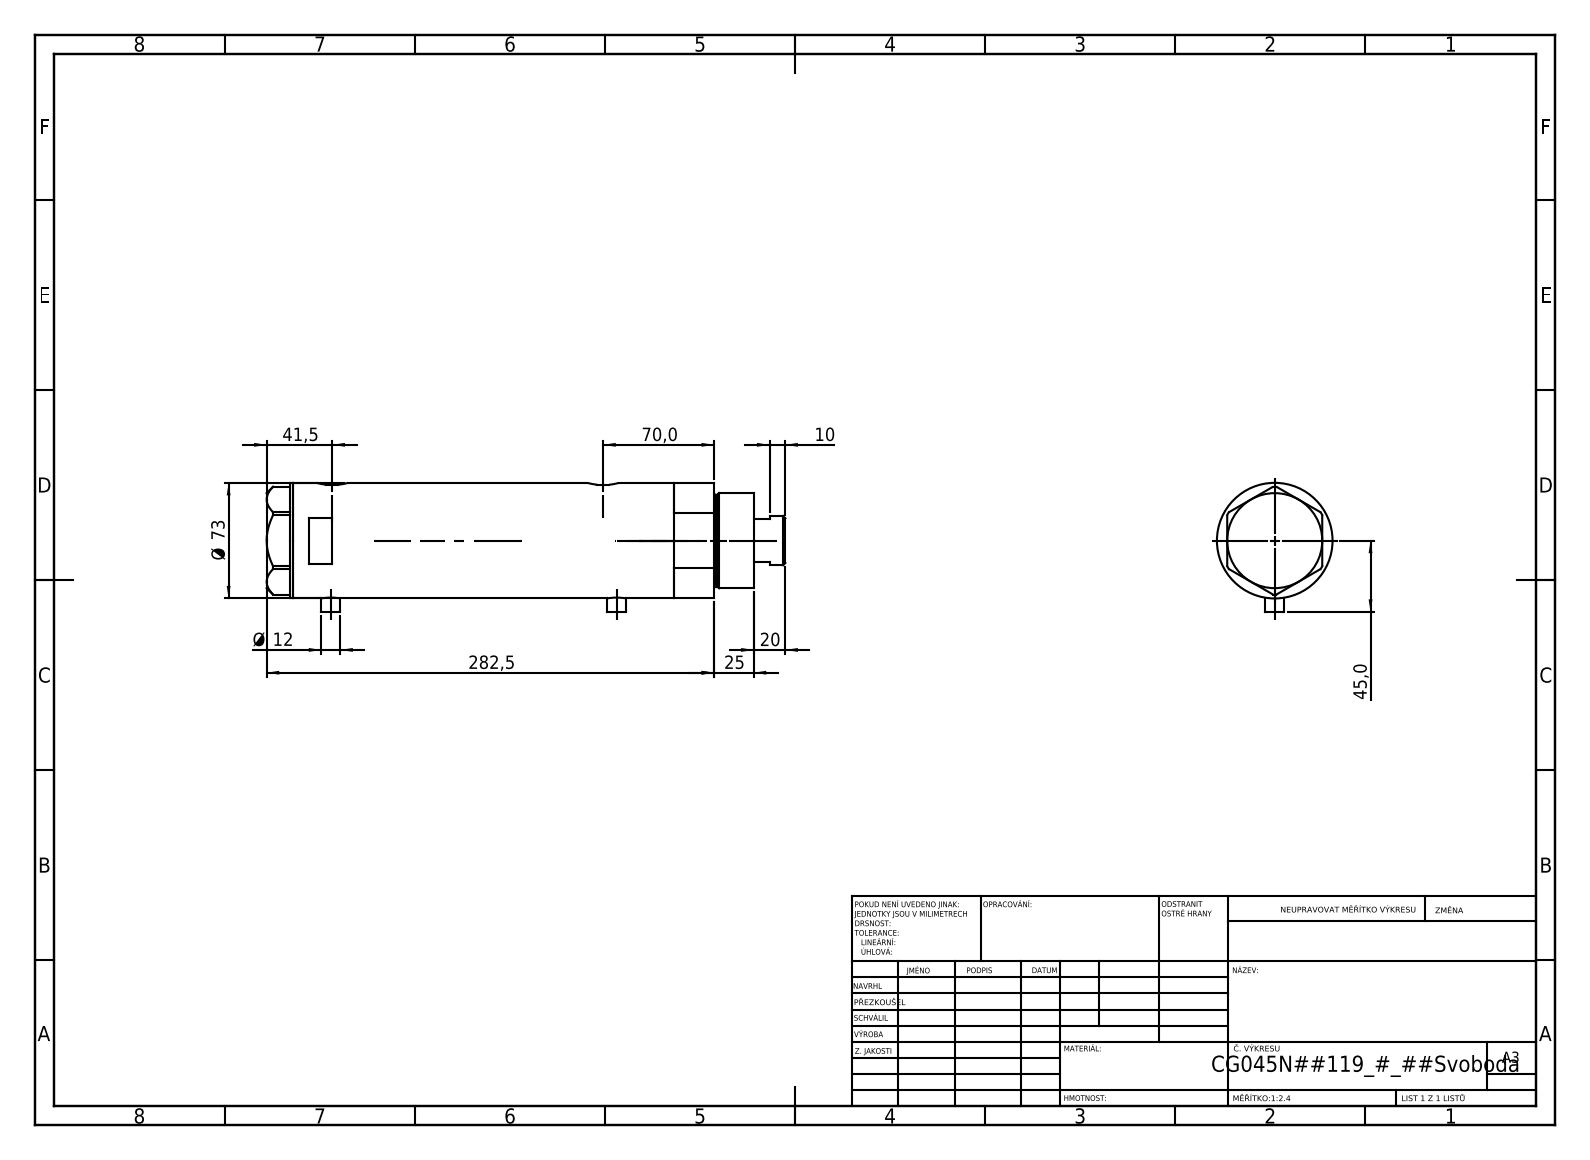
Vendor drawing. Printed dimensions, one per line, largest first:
282,5
Ø 73
70,0
45,0
41,5
25
20
Ø 12
10
